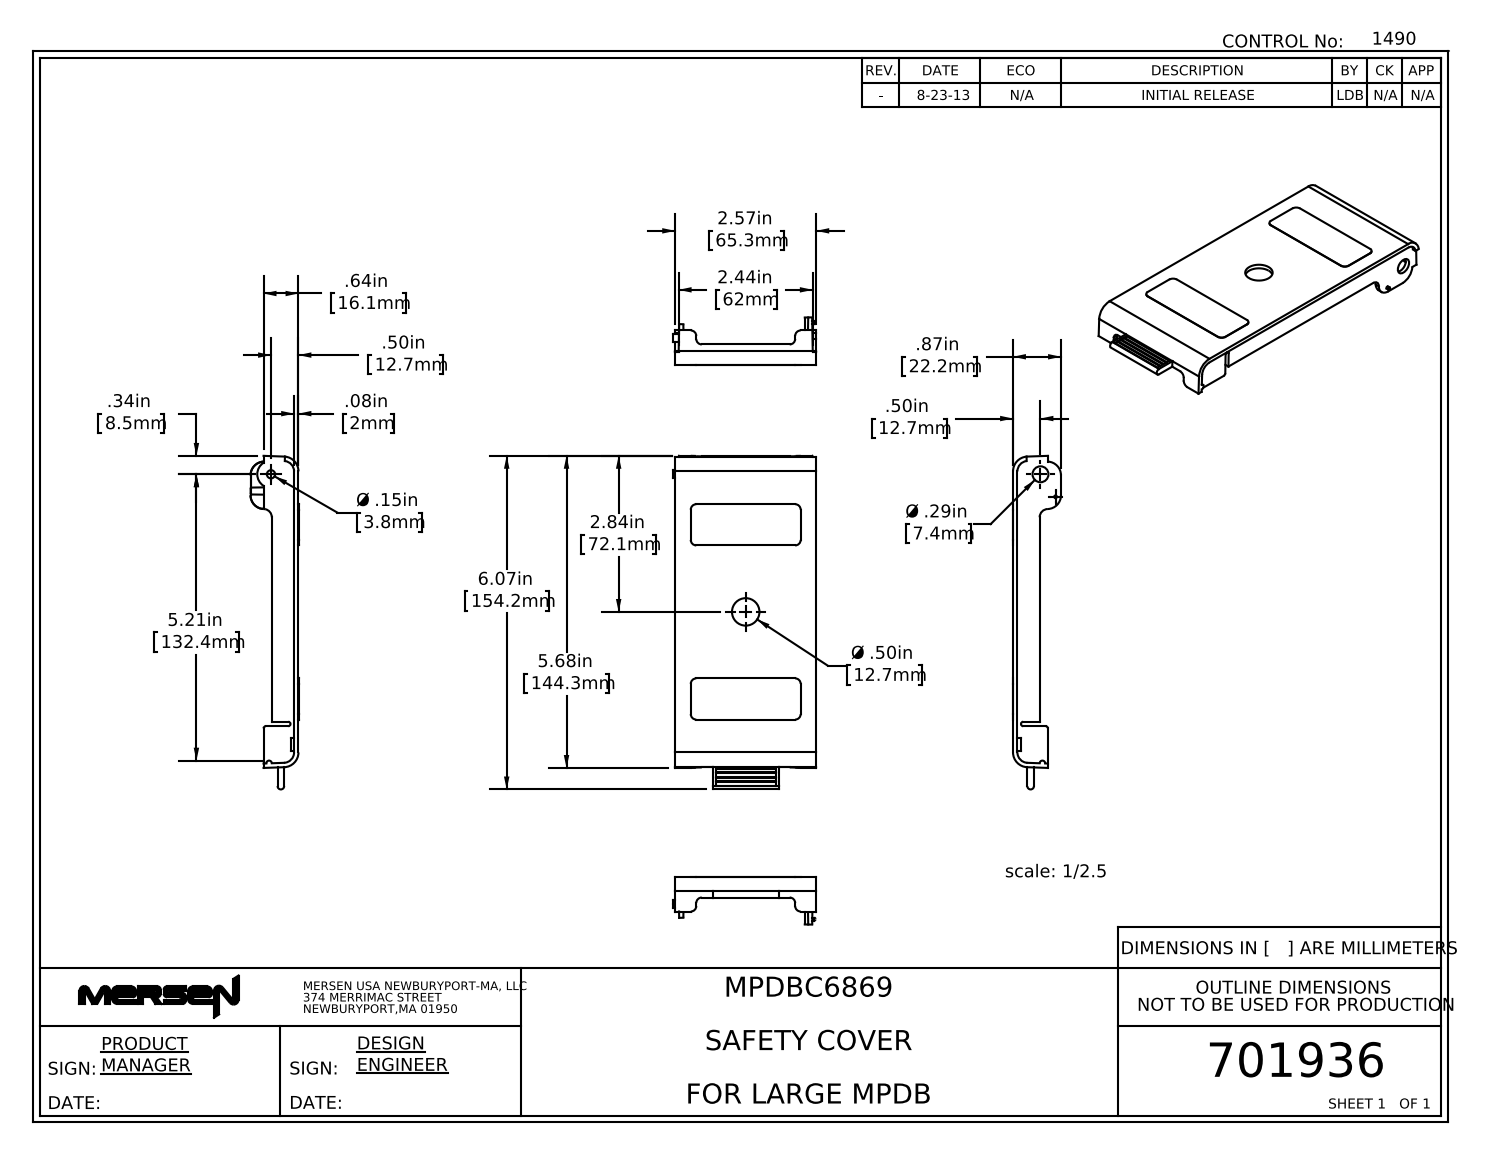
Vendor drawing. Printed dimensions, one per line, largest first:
6.07in 154.2mm
5.68in 144.3mm
5.21in 132.4mm
2.84in 72.1mm
2.57in 65.3mm
2.44in 62mm
.87in 22.2mm
.64in 16.1mm
Ø .50in 12.7mm
.50in 12.7mm
.50in 12.7mm
.34in 8.5mm
Ø .29in 7.4mm
Ø .15in 3.8mm
.08in 2mm
